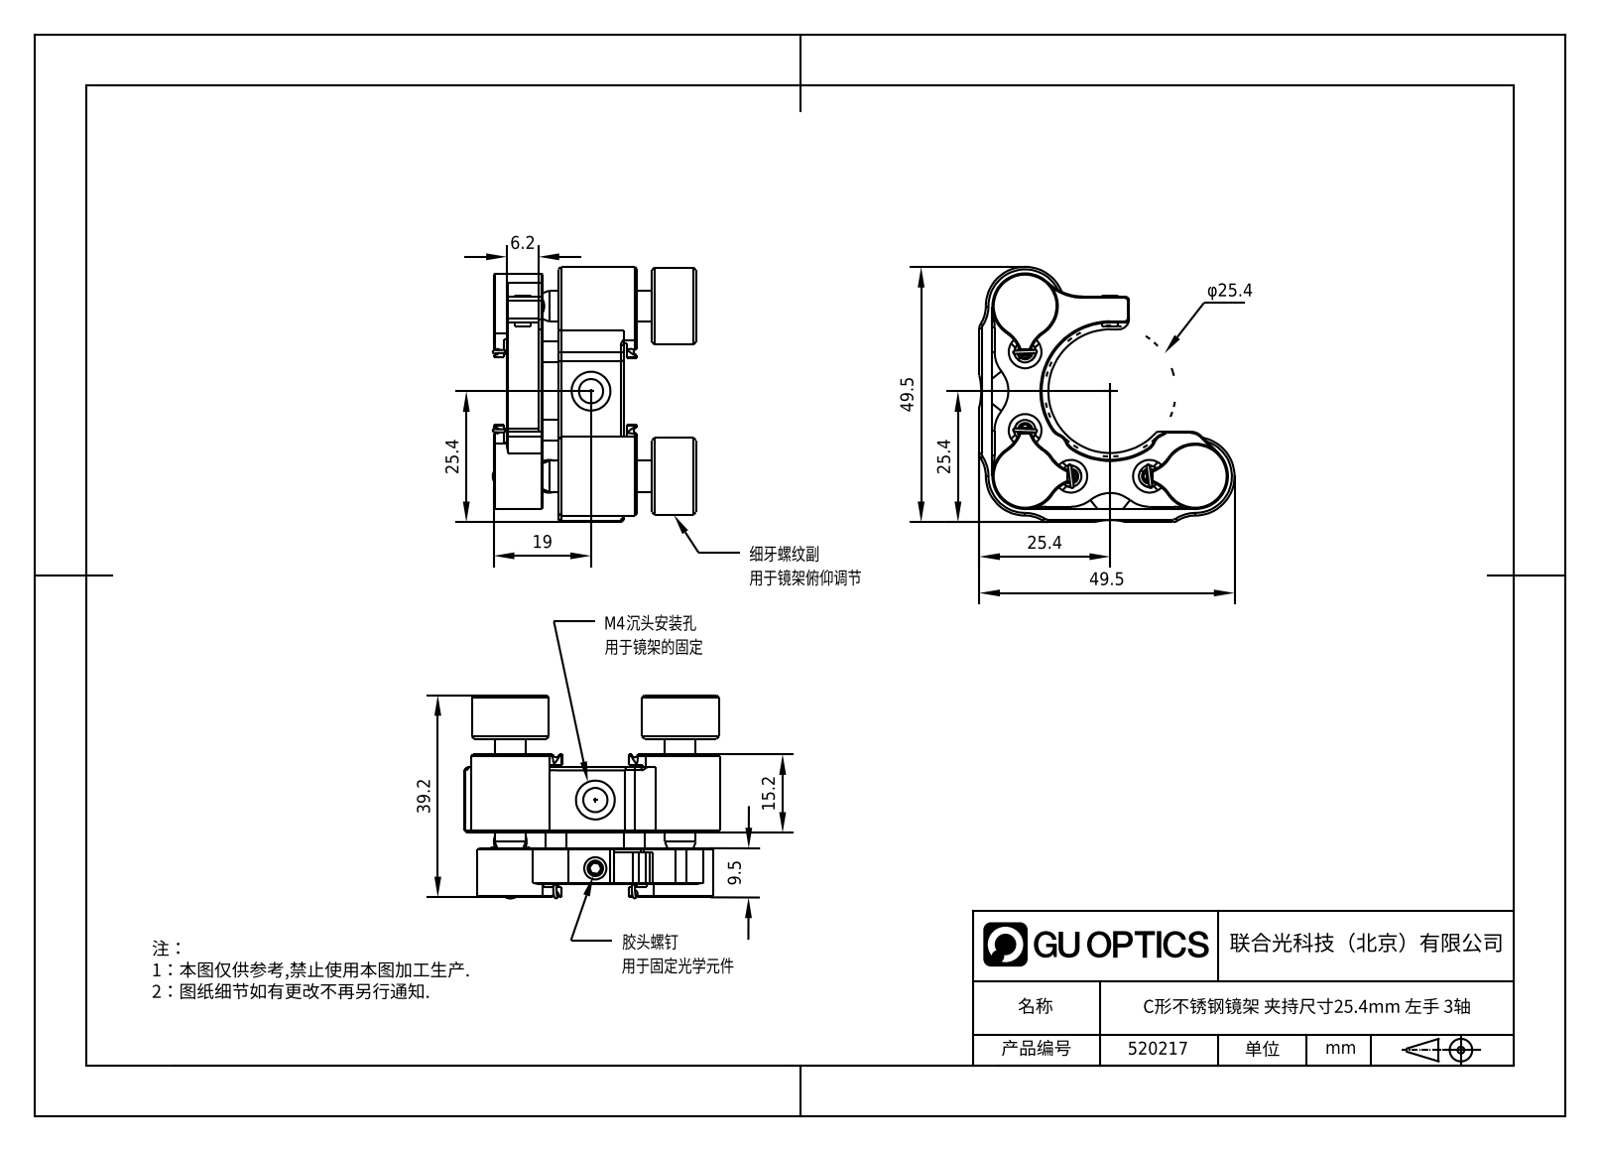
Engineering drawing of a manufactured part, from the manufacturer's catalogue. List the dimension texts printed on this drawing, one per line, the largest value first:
49.5
49.5
39.2
25.4
25.4
25.4
19
15.2
9.5
6.2
